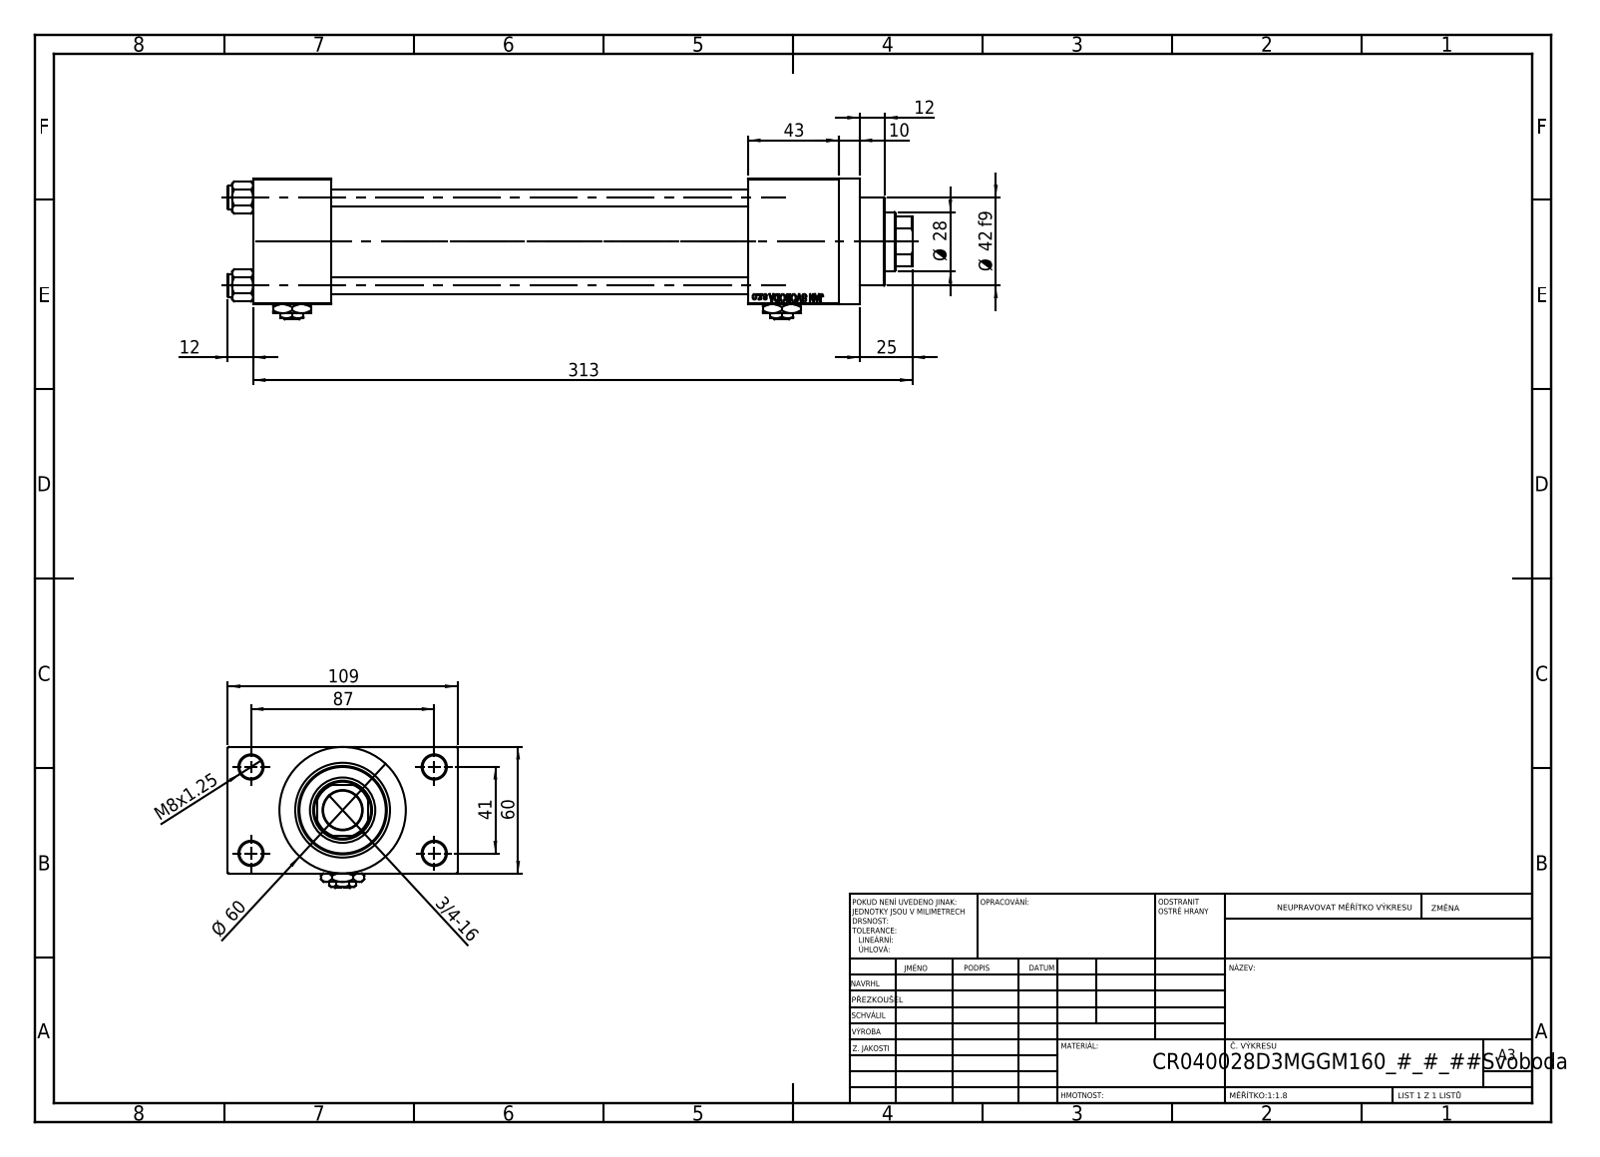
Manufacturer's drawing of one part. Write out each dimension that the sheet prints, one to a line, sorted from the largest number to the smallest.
313
109
87
Ø 60
60
43
Ø 42 f9
41
Ø 28
25
12
12
10
M8x1.25
3/4-16
